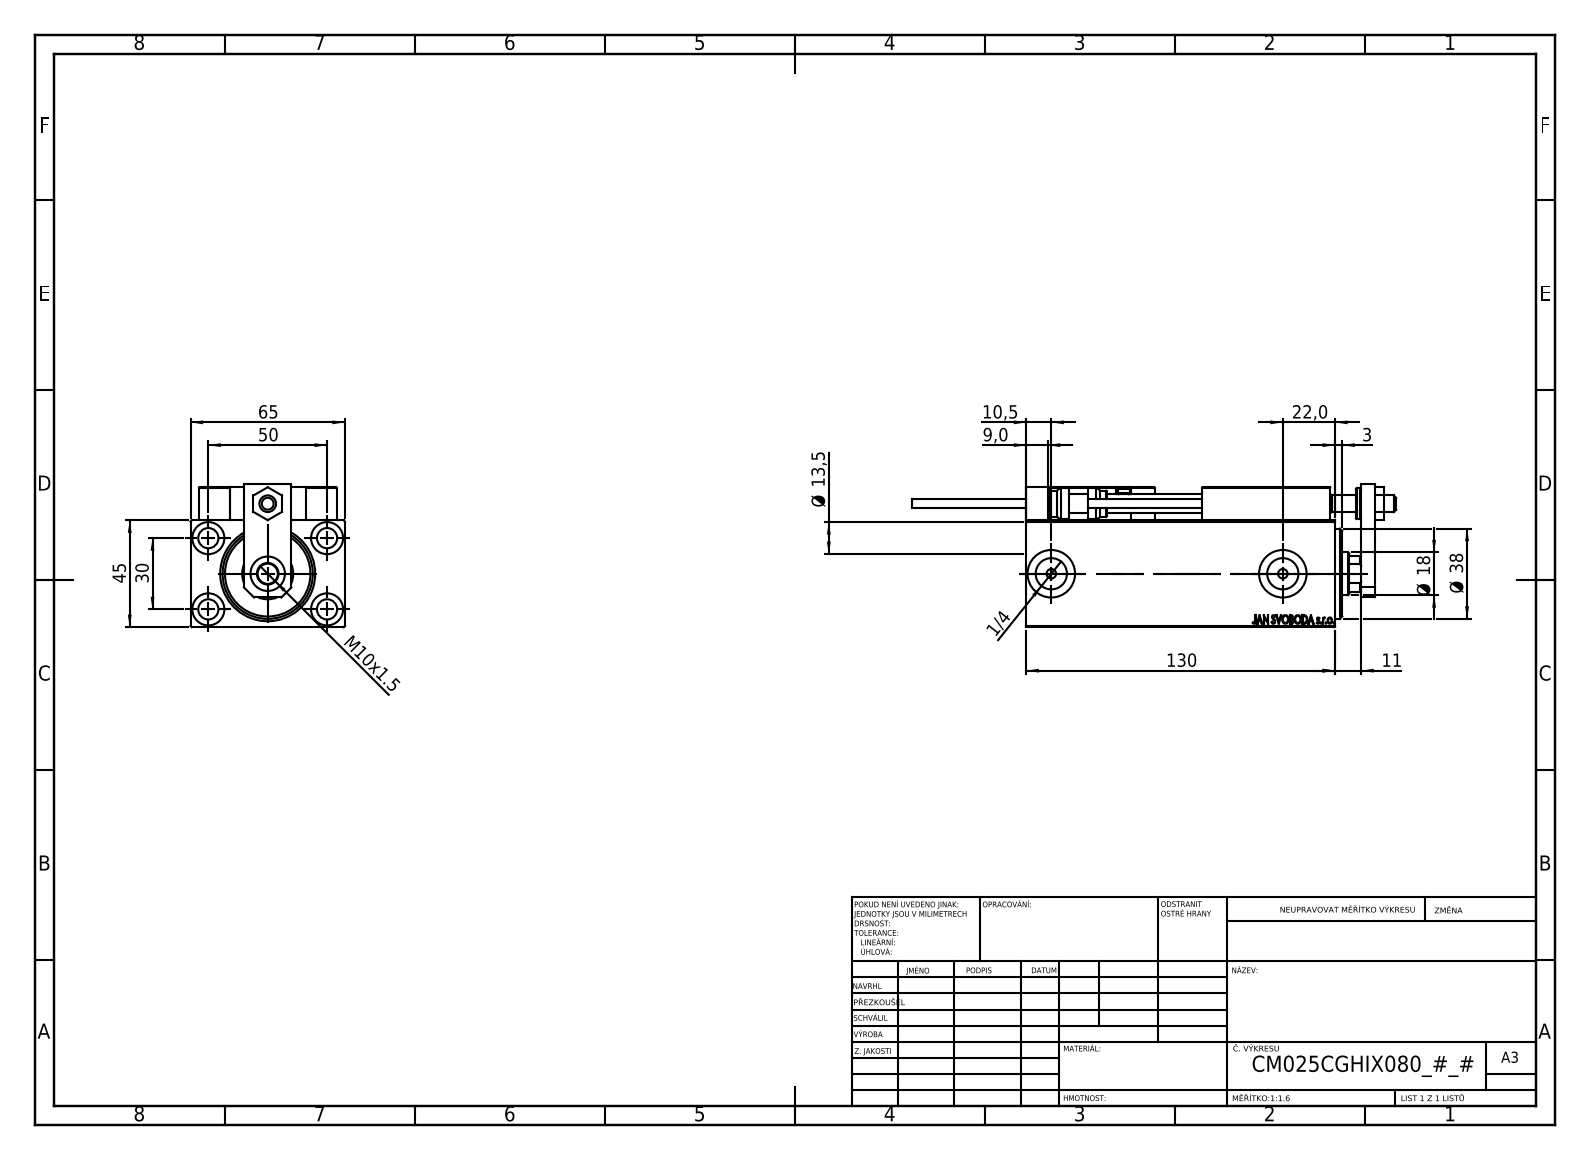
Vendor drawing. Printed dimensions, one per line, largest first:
130
65
50
45
Ø 38
30
22,0
Ø 18
Ø 13,5
11
10,5
M10x1.5
9,0
3
1/4
